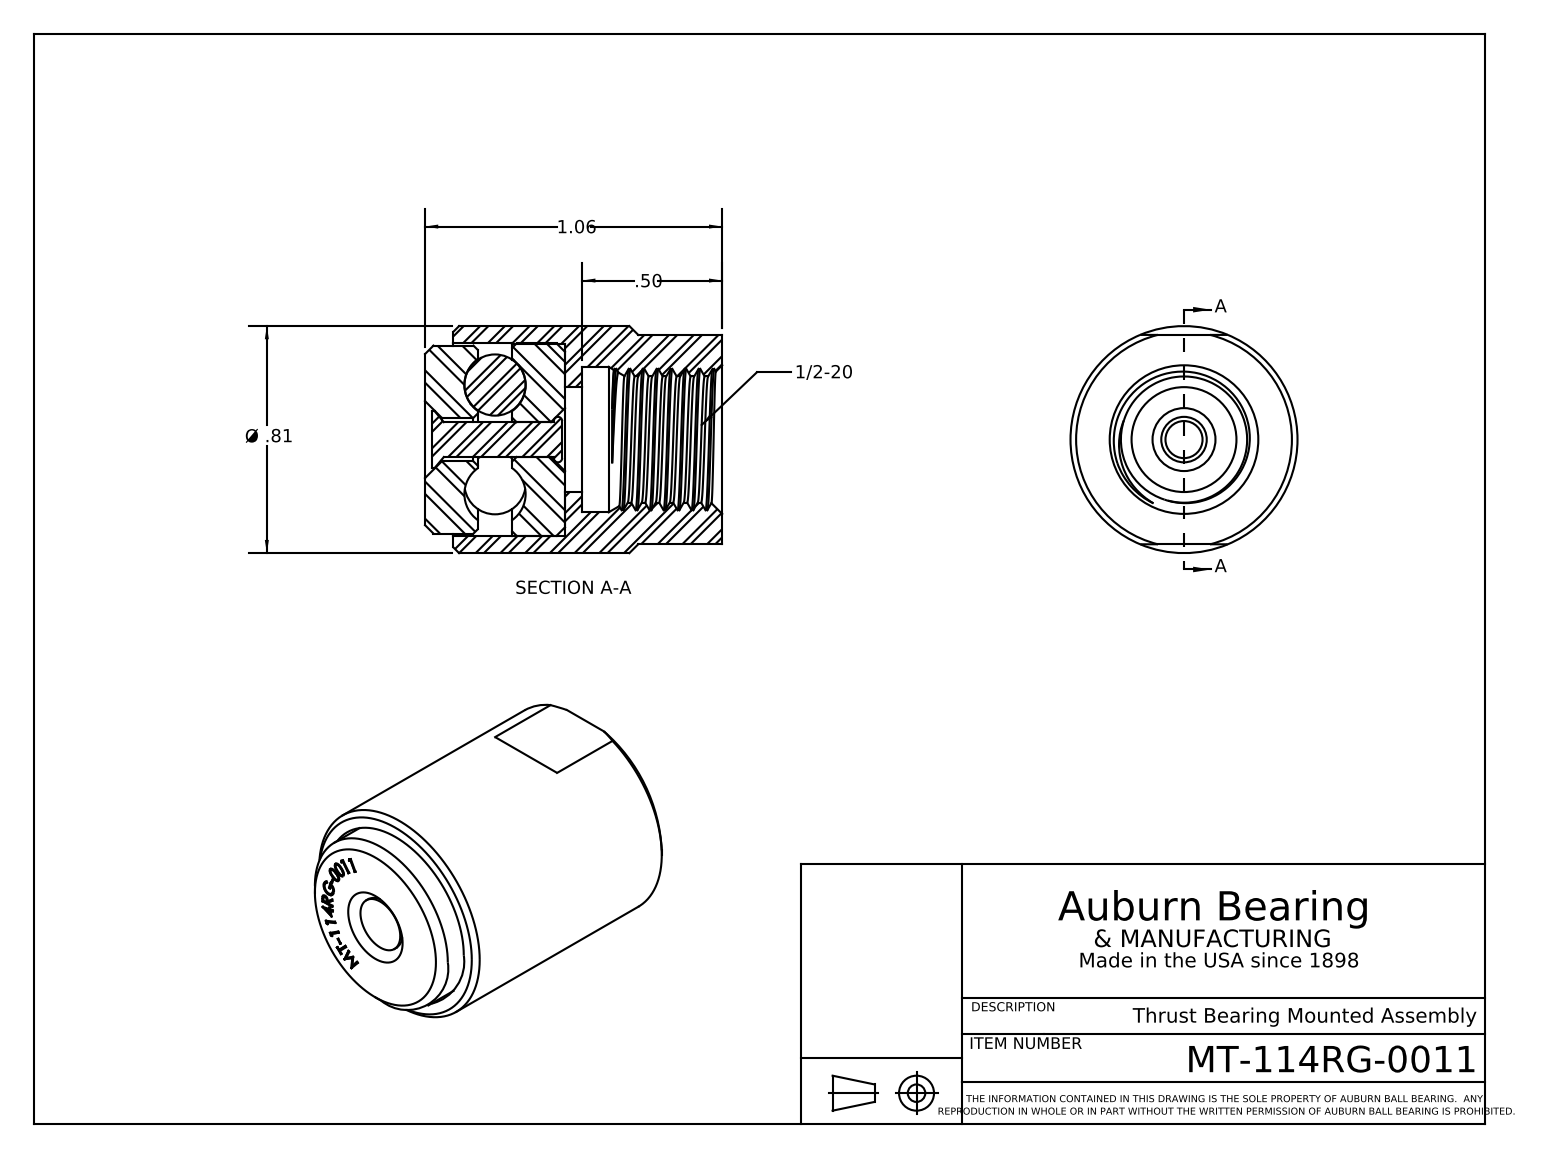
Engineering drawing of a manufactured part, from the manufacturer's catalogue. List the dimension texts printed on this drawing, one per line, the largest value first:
1.06
Ø .81
.50
